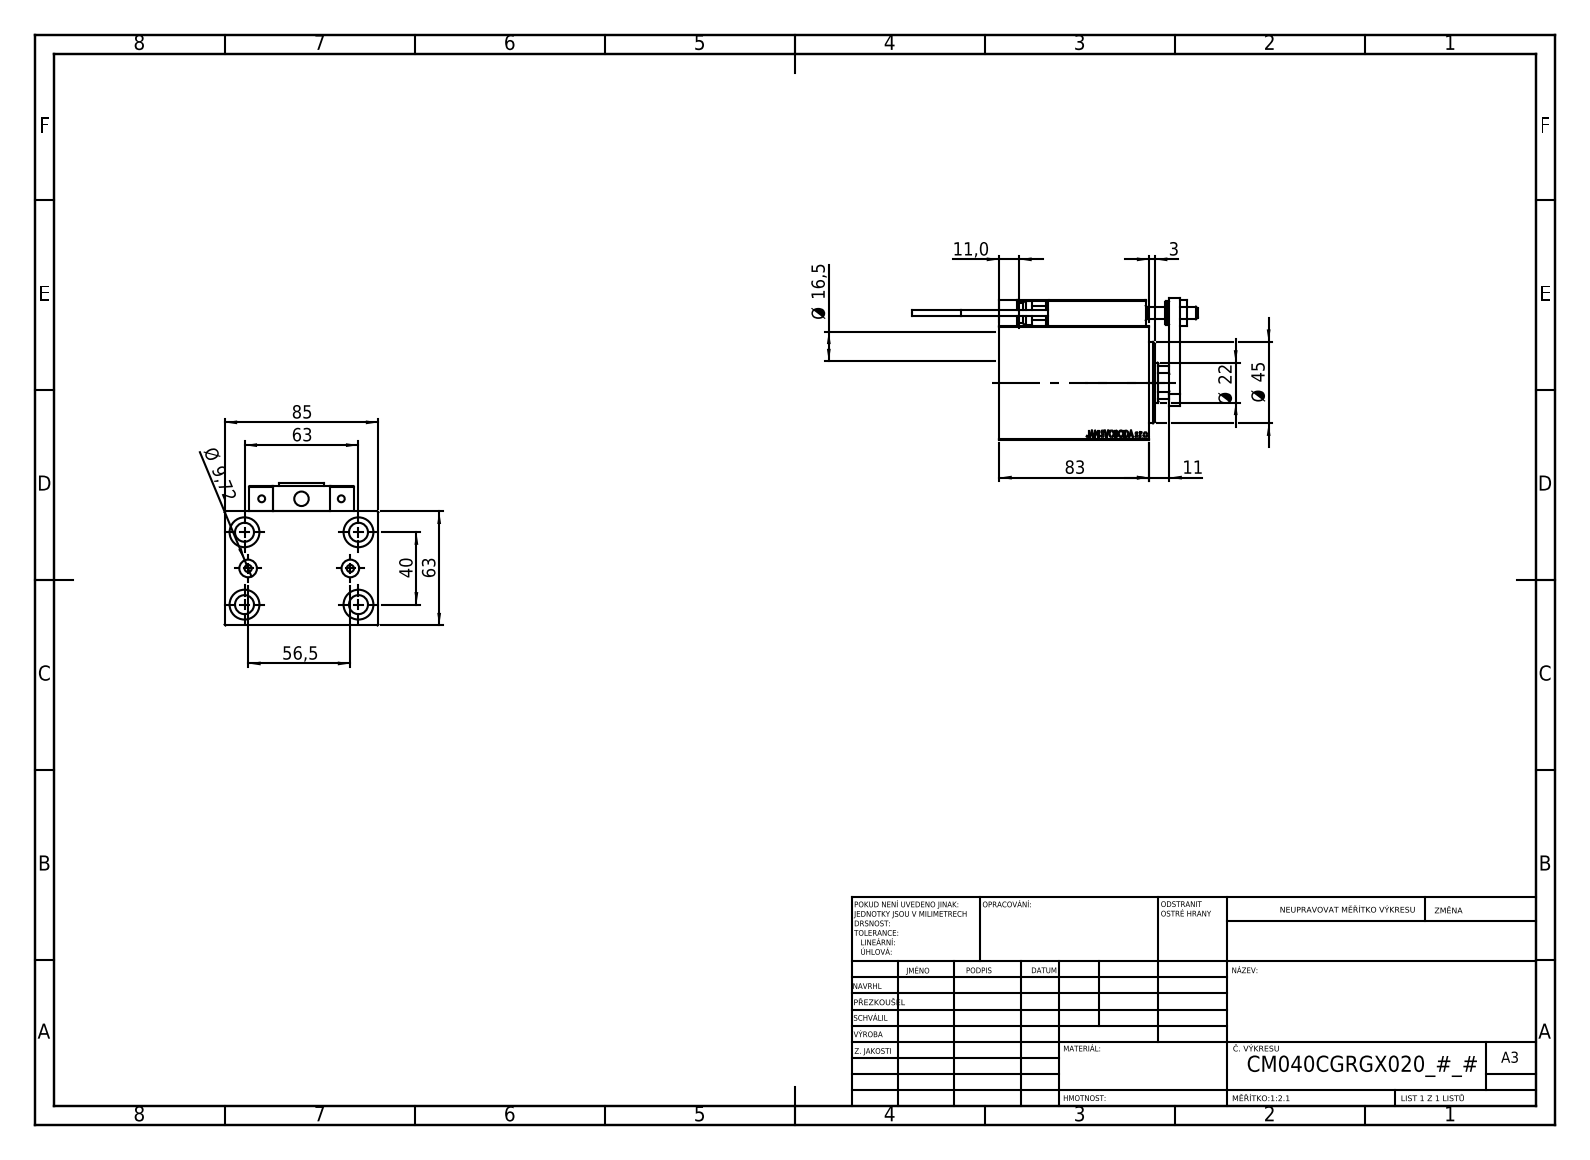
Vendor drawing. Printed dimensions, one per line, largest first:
85
83
63
63
56,5
Ø 45
40
Ø 22
Ø 16,5
11
11,0
Ø 9,72
3
